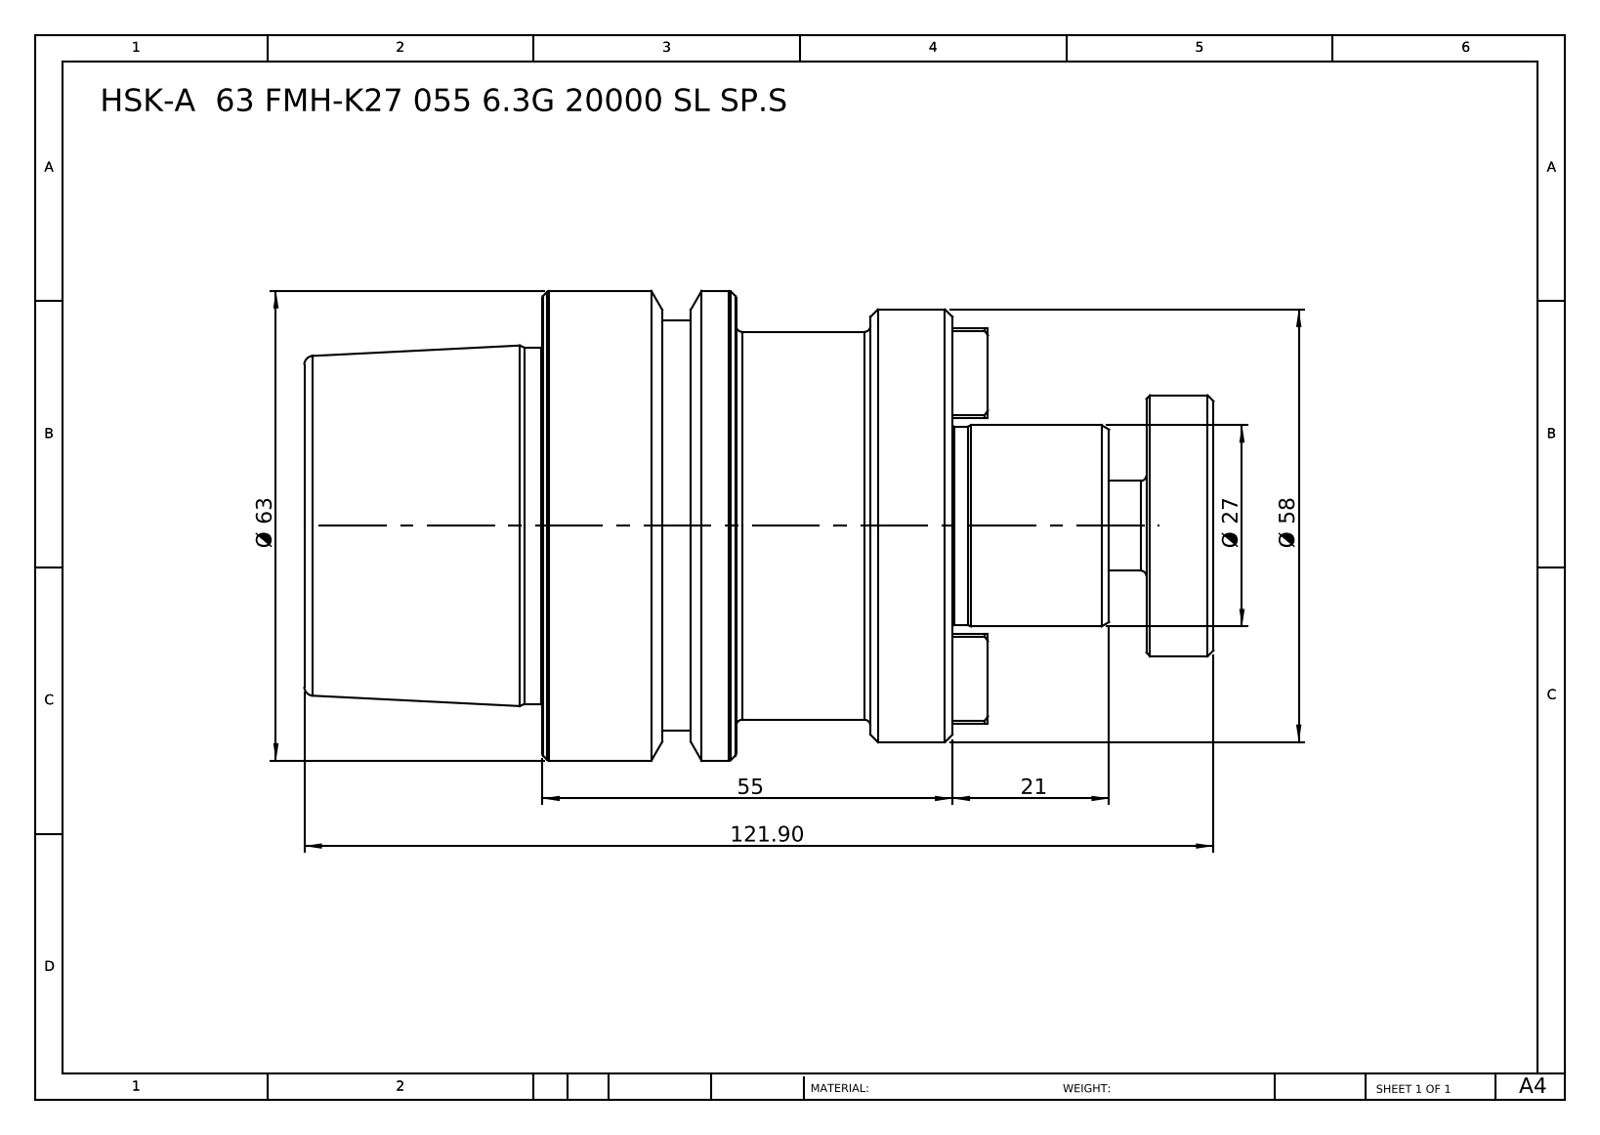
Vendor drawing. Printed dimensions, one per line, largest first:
121.90
Ø 63
Ø 58
55
Ø 27
21
